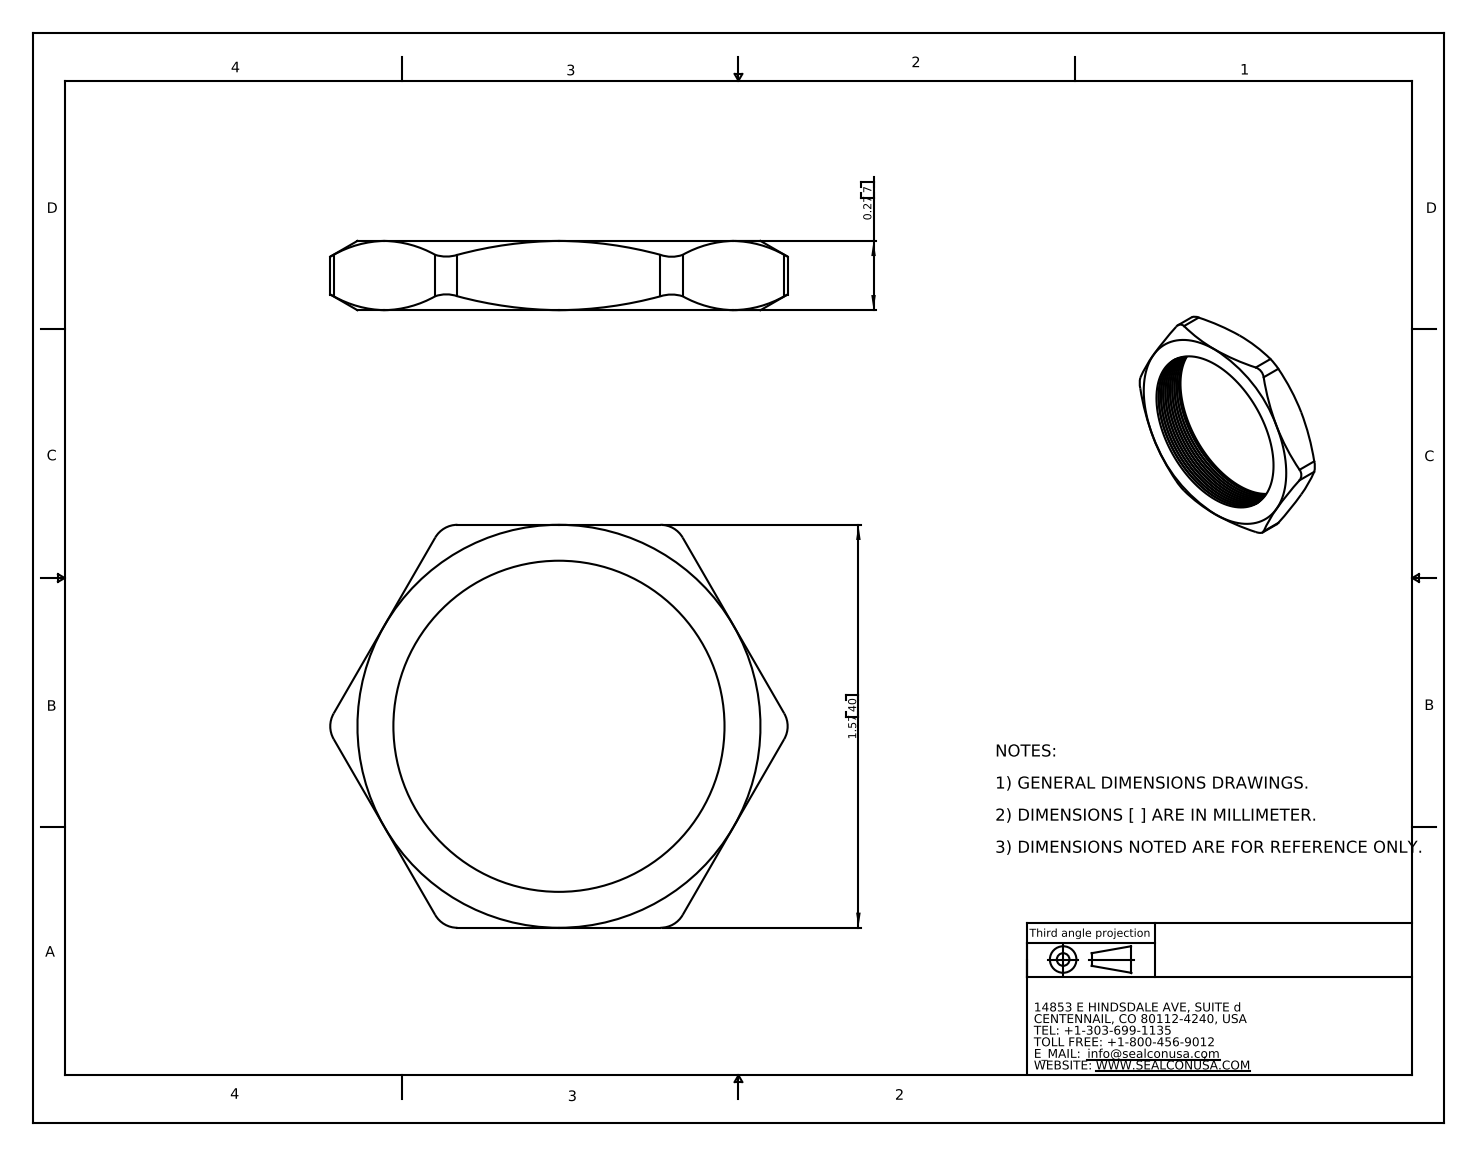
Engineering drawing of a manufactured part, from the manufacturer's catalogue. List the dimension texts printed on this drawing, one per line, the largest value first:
1.57 40
0.27 7
